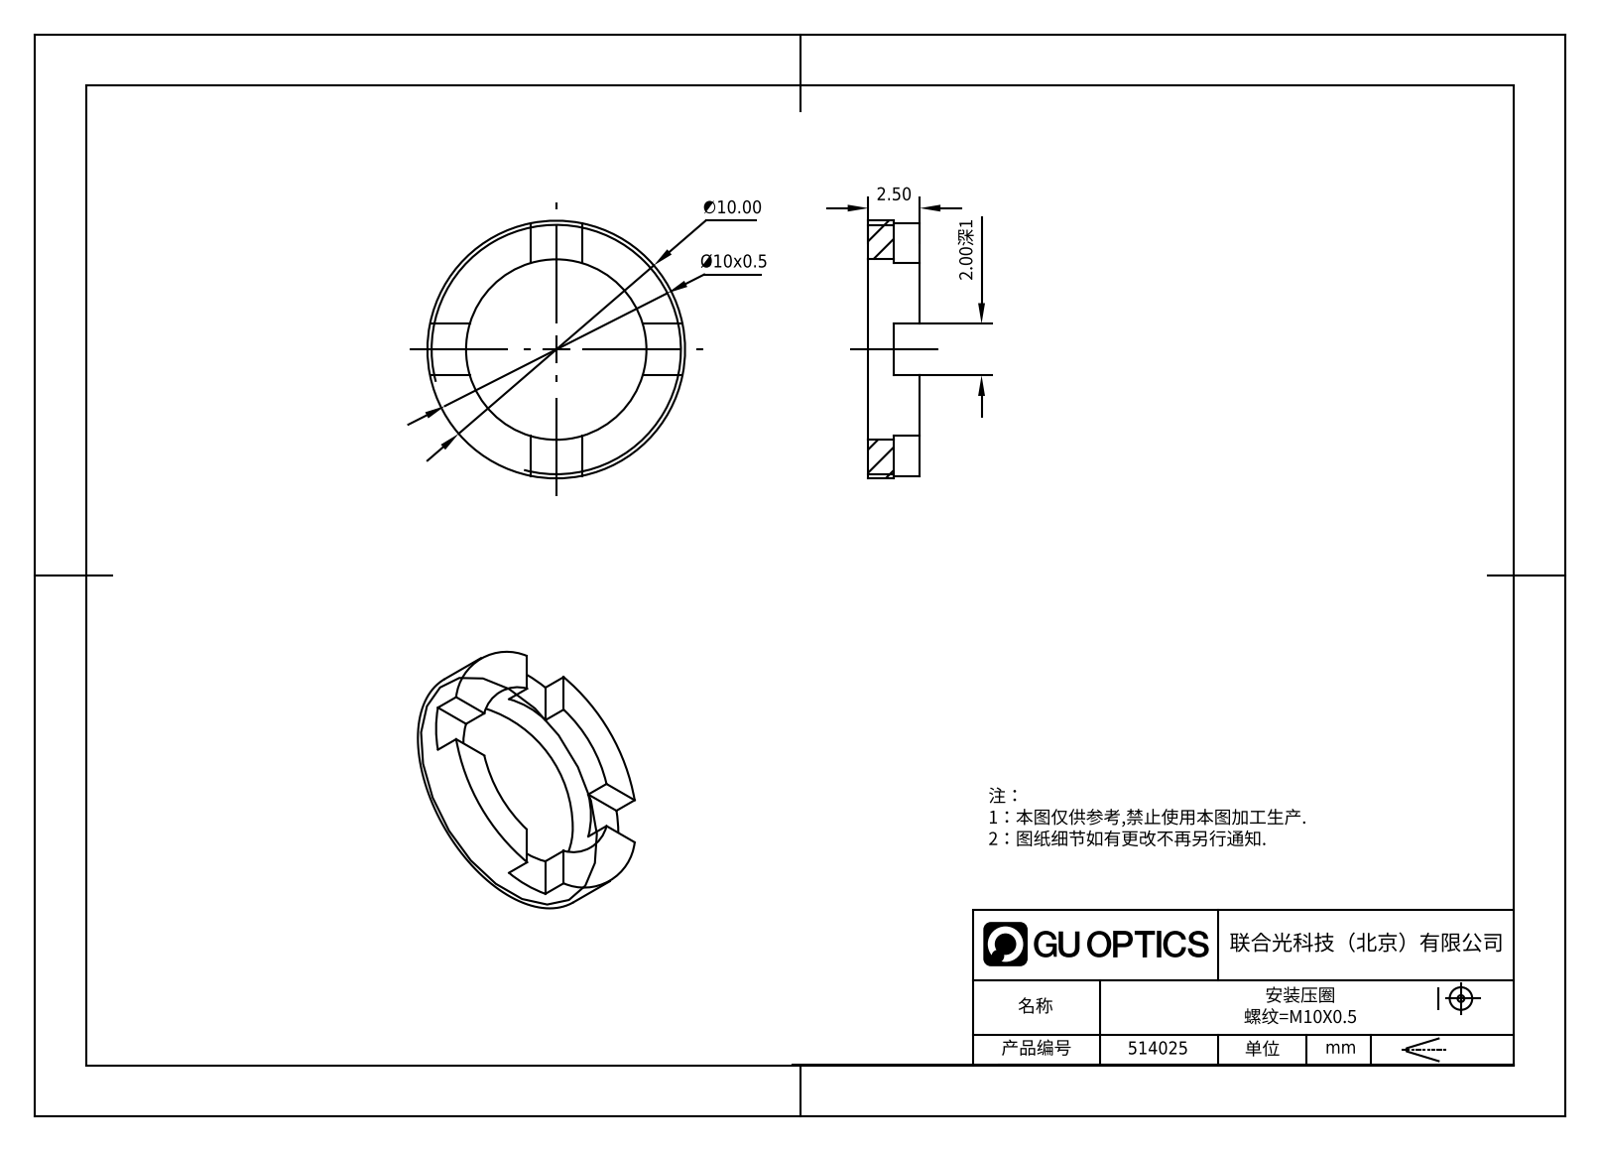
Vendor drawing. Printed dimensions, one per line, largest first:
∅10.00
Ø10x0.5
2.50
2.00深1
